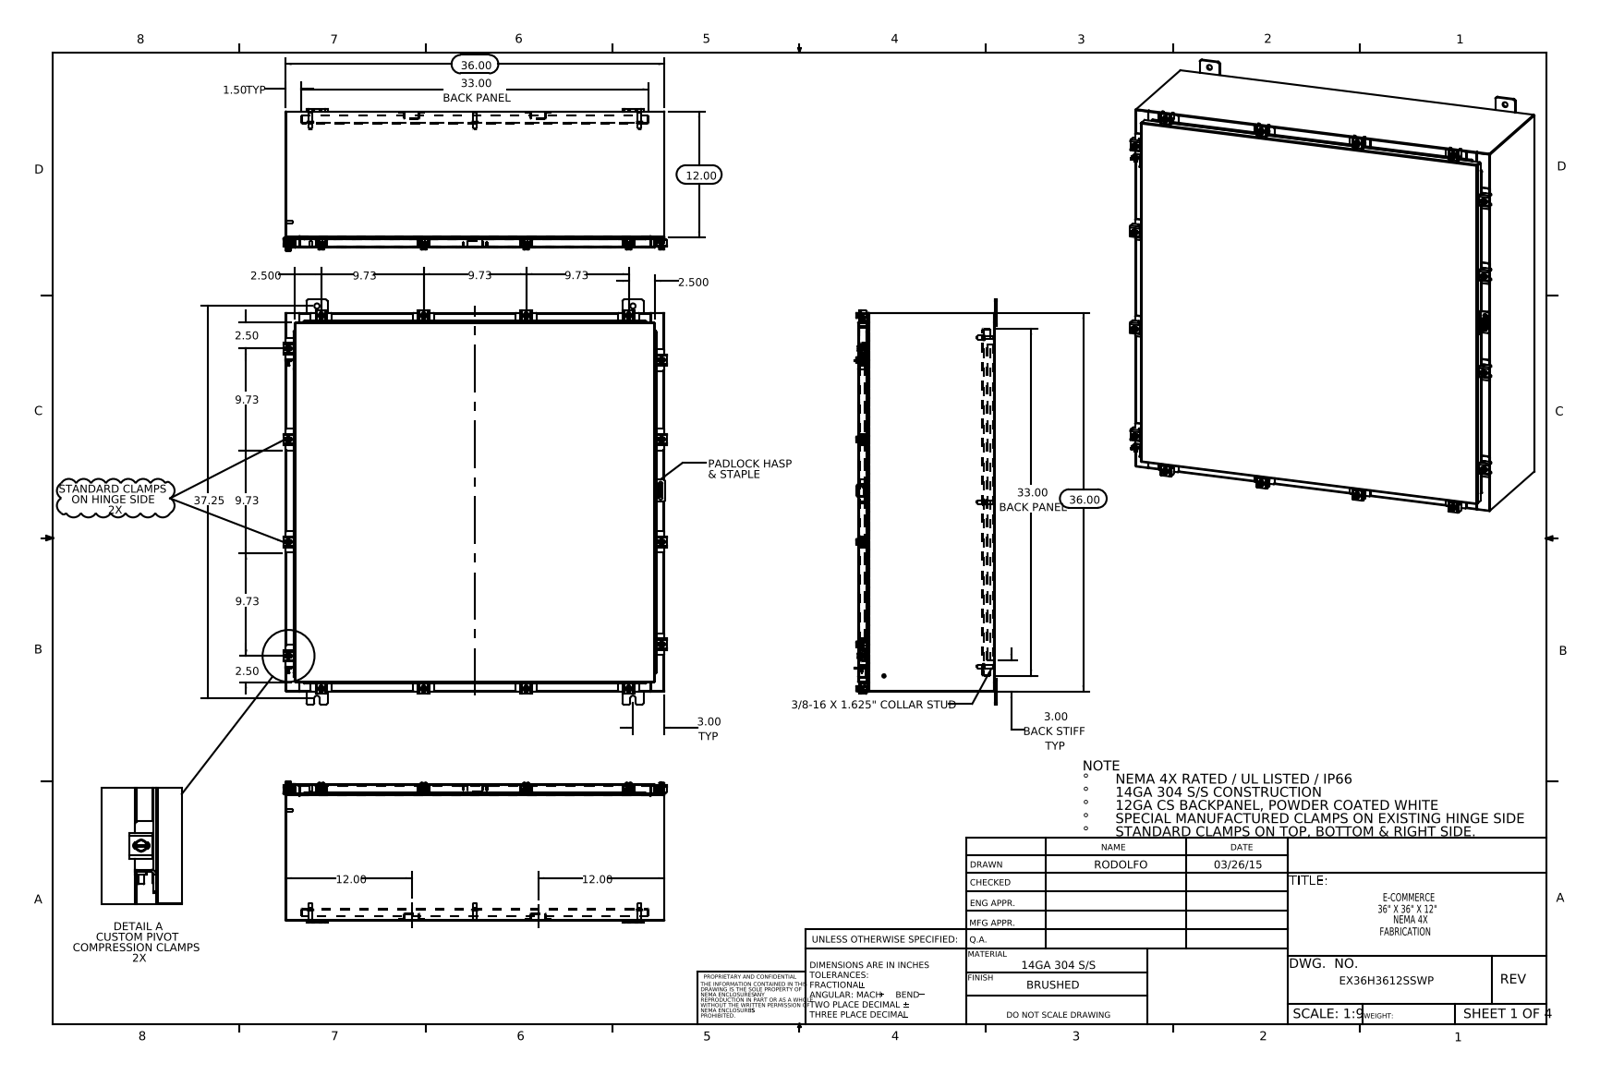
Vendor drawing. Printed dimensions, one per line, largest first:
37.25
36.00
36.00
33.00 BACK PANEL
33.00 BACK PANEL
12.00
12.00
12.00
9.73
9.73
9.73
9.73
9.73
9.73
3.00 TYP
3.00 BACK STIFF TYP
2.500
2.500
2.50
2.50
1.50 TYP
